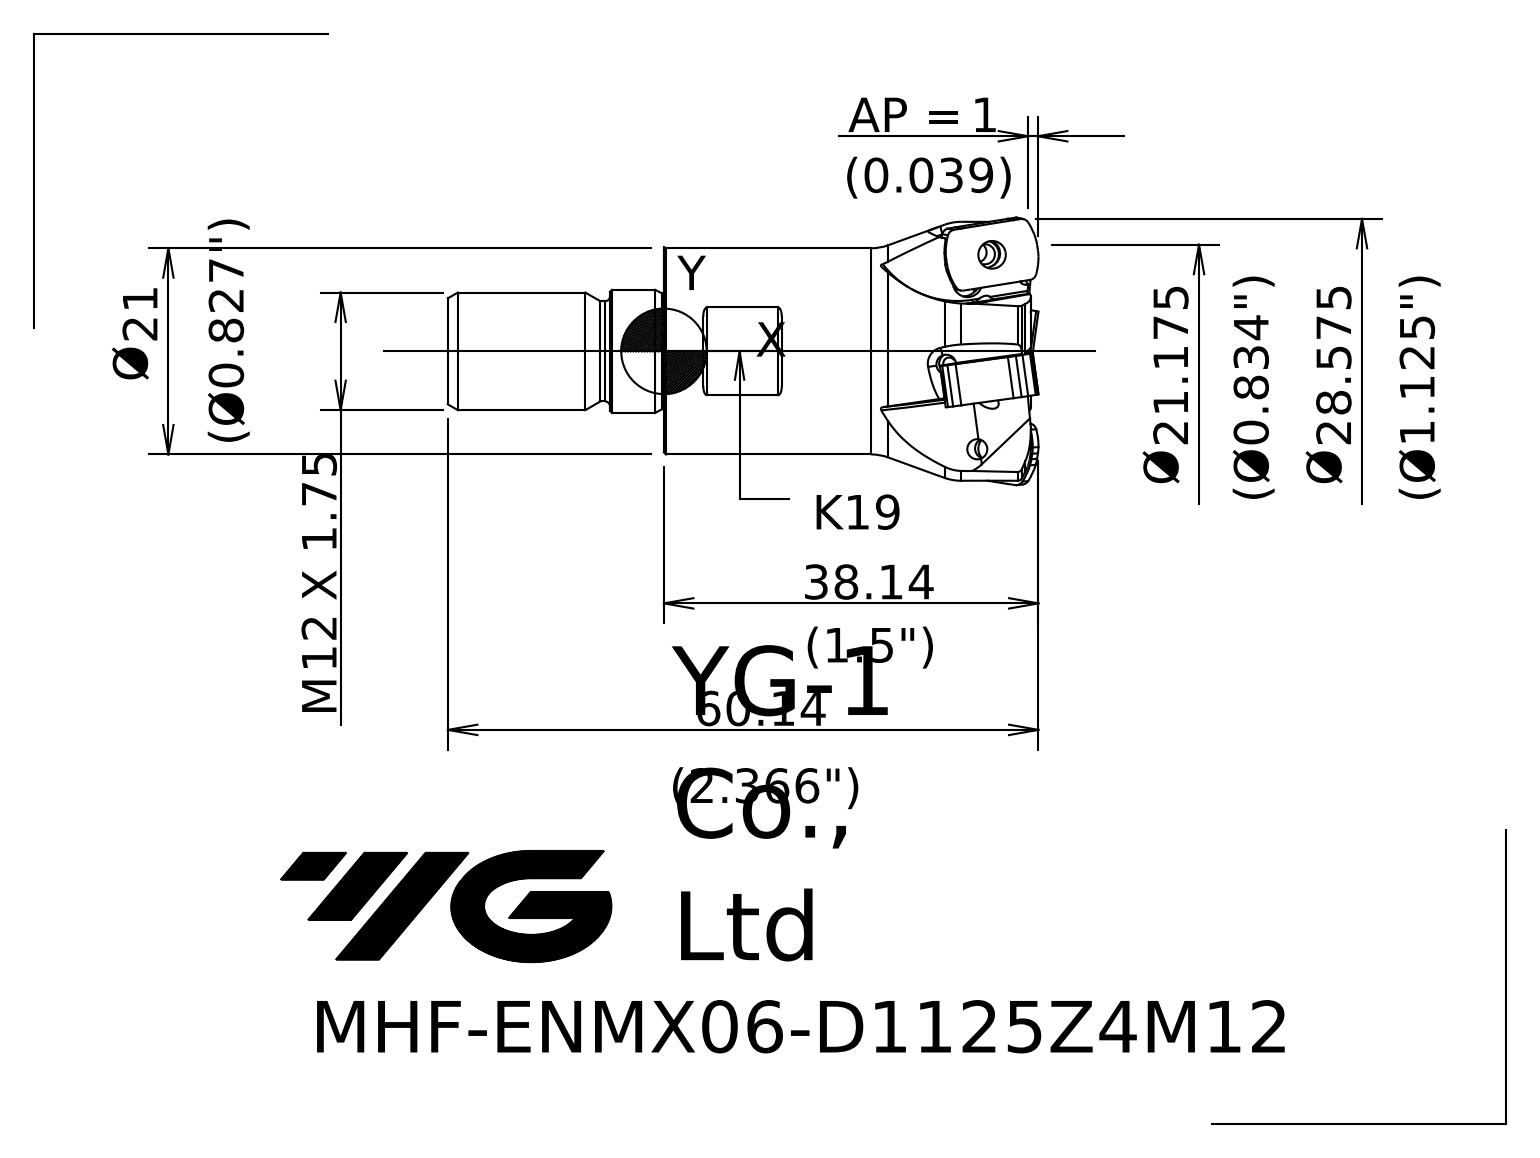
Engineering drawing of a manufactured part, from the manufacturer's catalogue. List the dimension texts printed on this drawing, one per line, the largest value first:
21.175 Ø
21 Ø
M X 1.75 12
AP = 1
